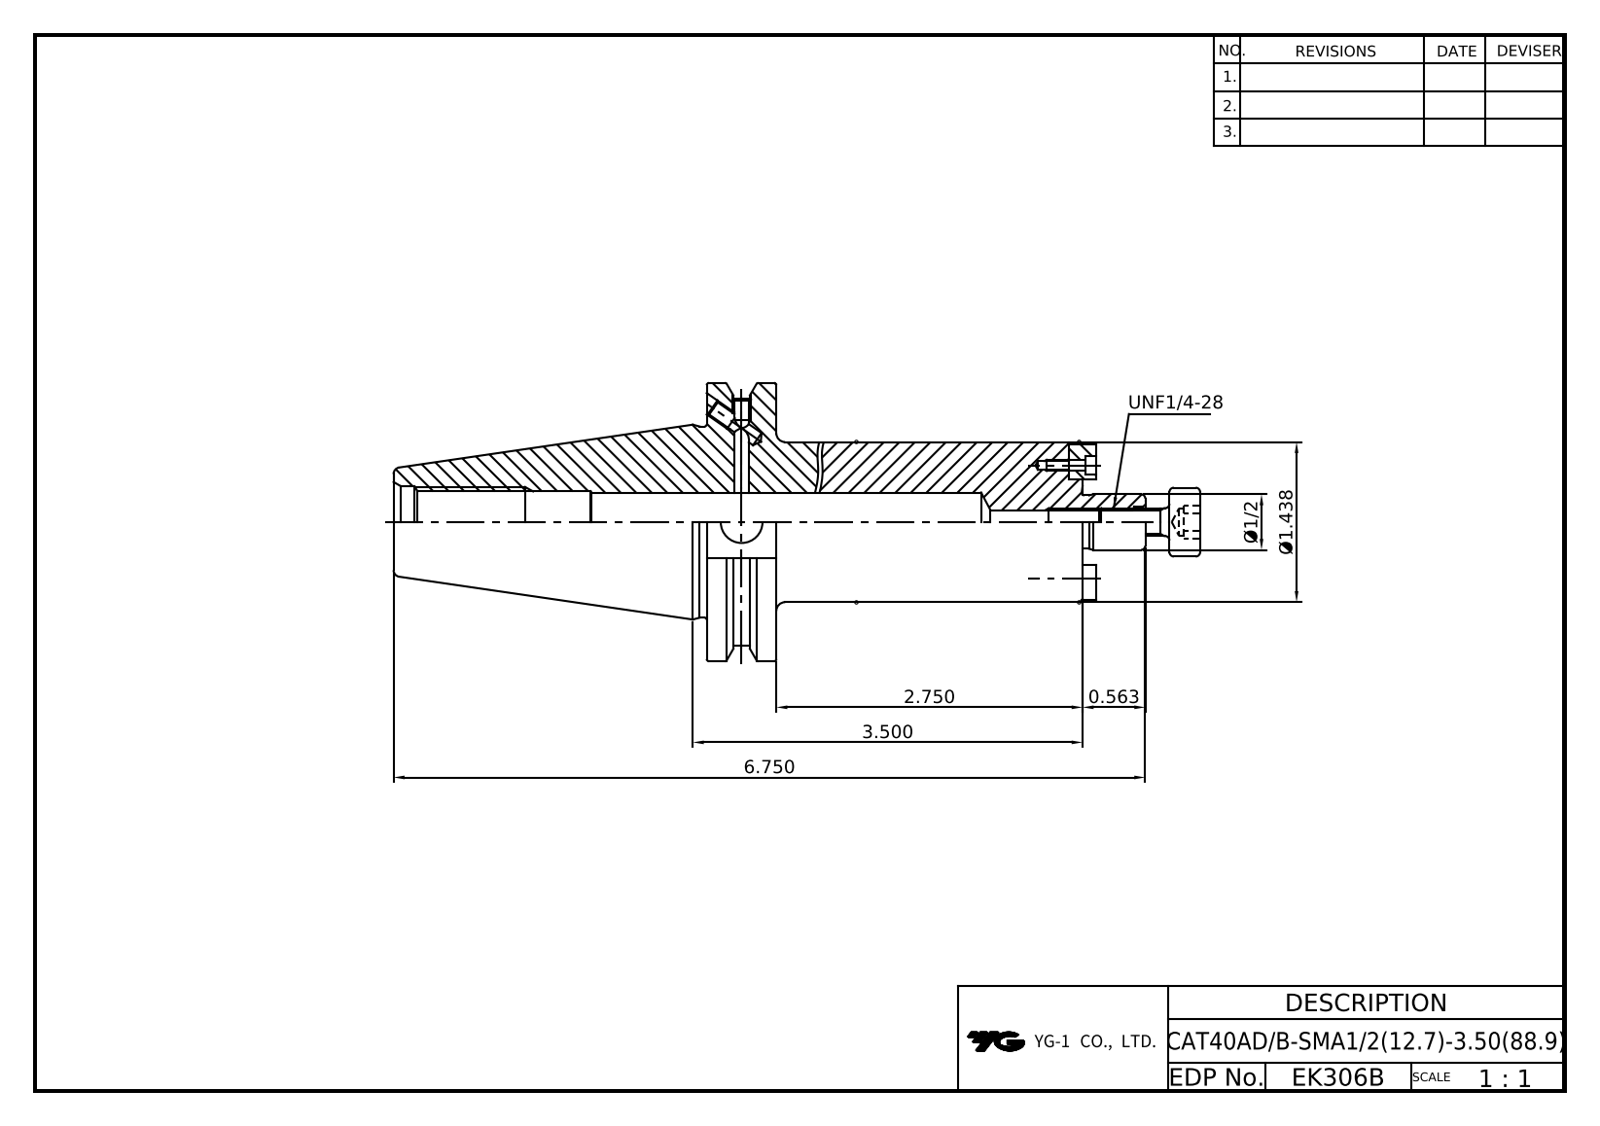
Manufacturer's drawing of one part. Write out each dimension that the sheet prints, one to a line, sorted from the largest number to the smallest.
6.750
3.500
2.750
Ø1.438
0.563
Ø1/2
